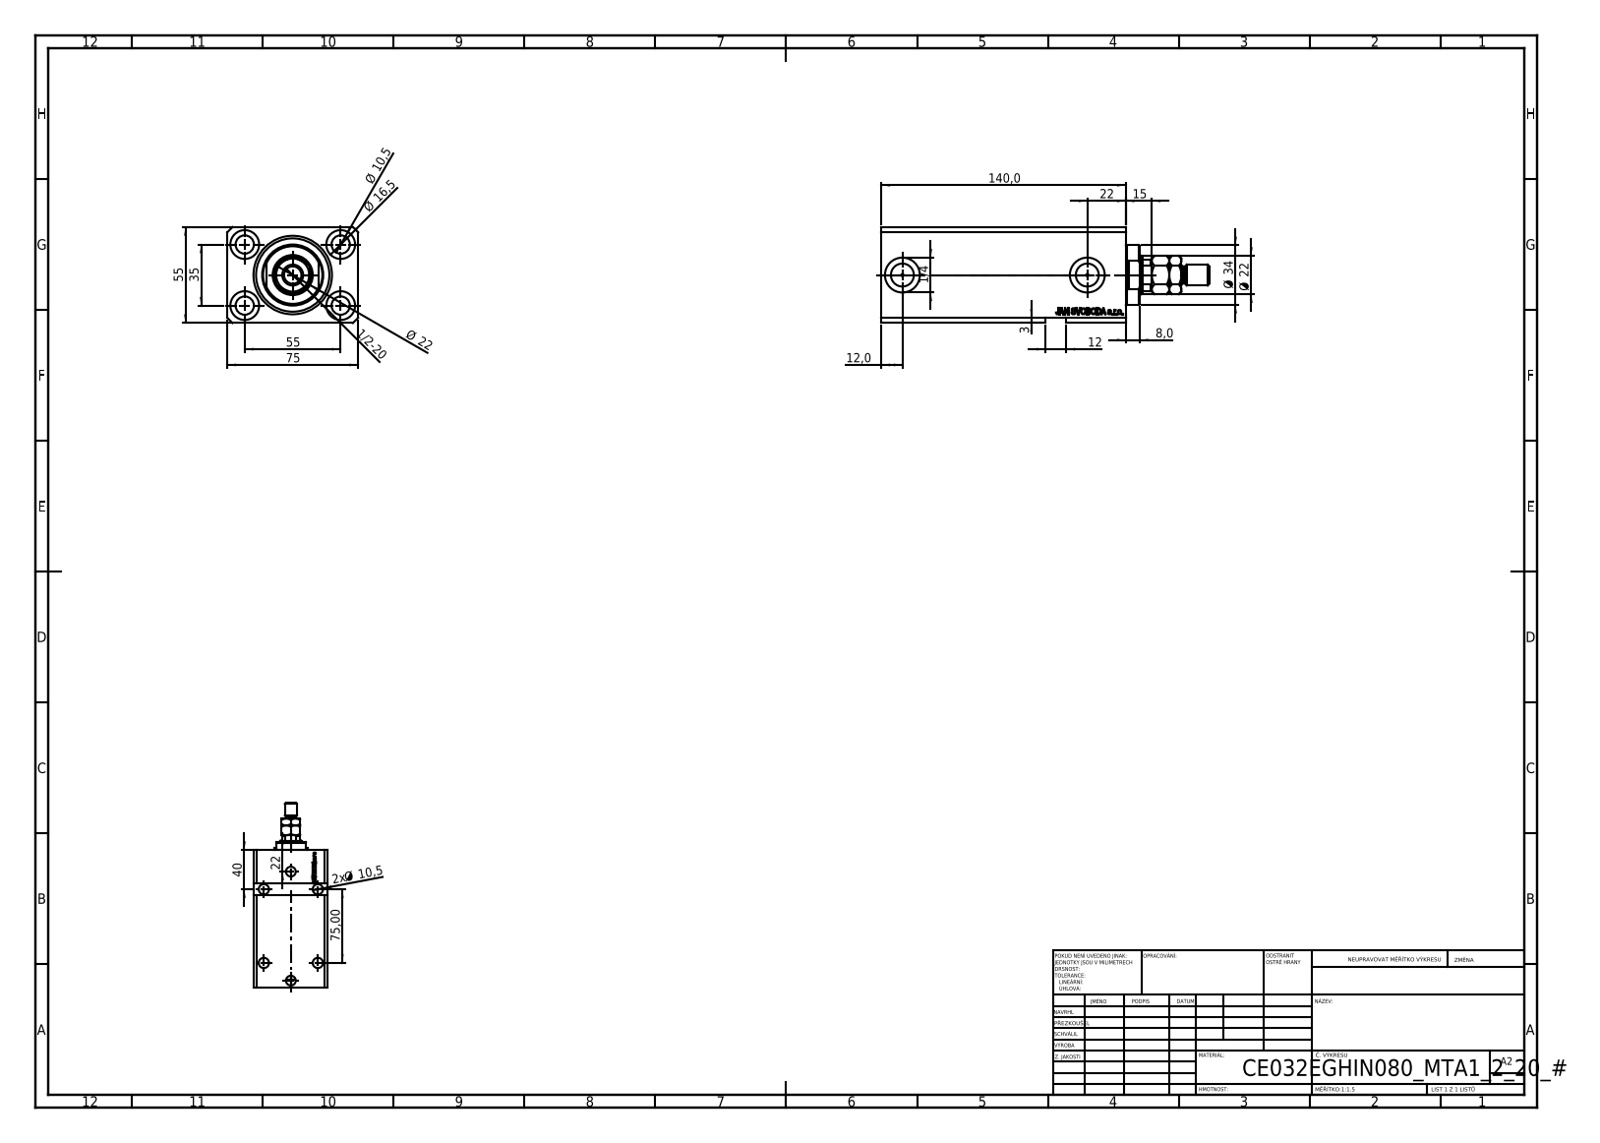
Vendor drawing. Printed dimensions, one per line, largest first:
140,0
75
75,00
55
55
40
35
Ø 34
Ø 22
22
Ø 22
22
Ø 16,5
15
12,0
12
Ø 10,5
2x Ø 10,5
8,0
3
1/2-20
1/4
